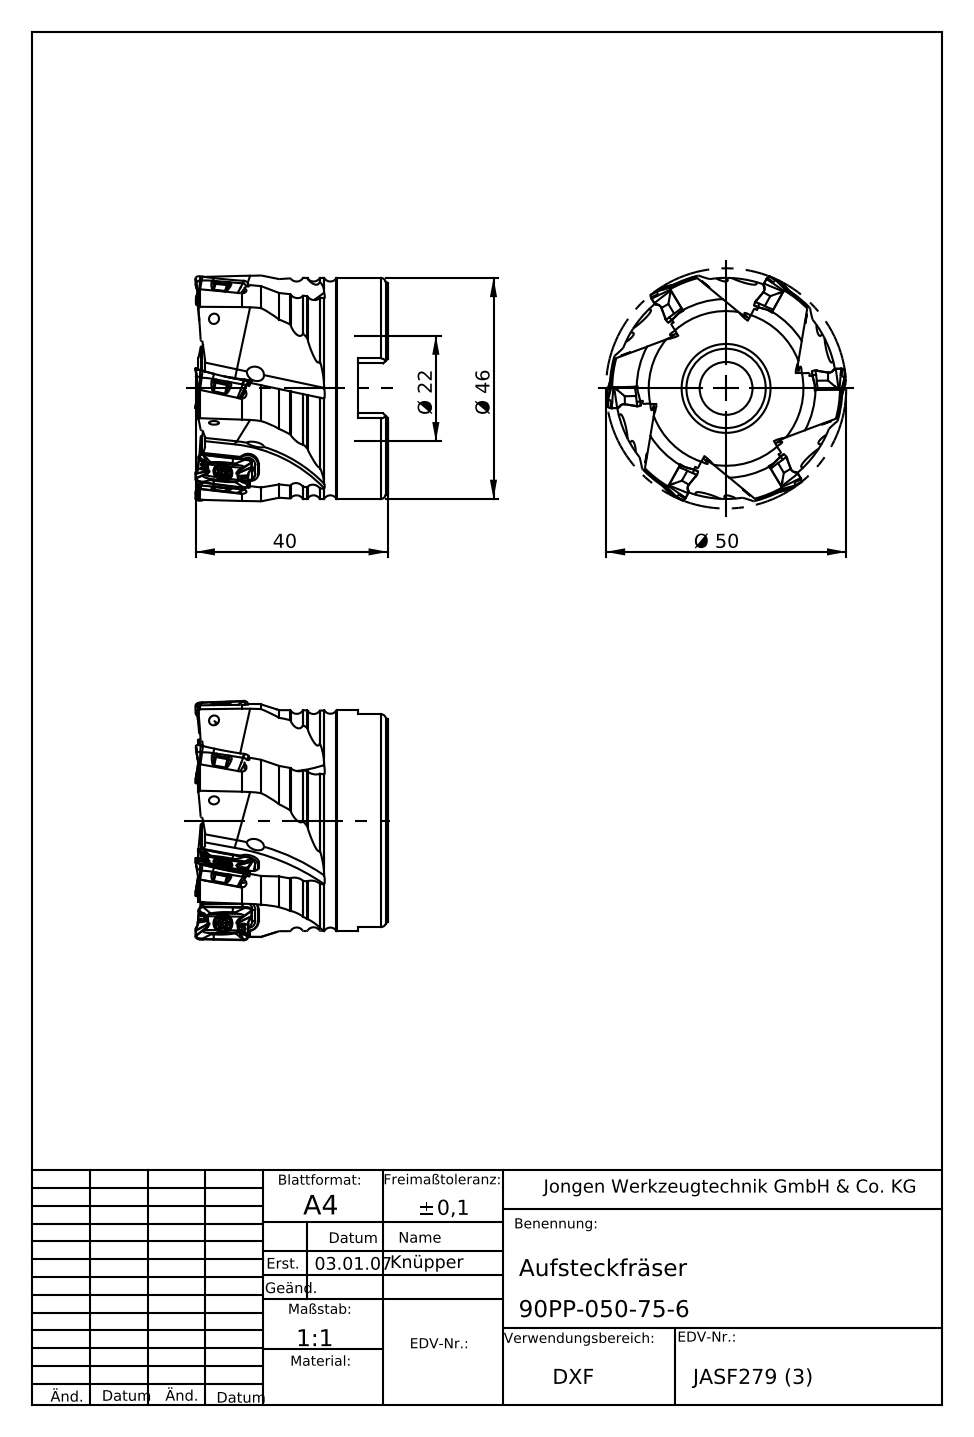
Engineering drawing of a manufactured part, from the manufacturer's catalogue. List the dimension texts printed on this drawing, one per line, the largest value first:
Ø 50
Ø 46
40
Ø 22
